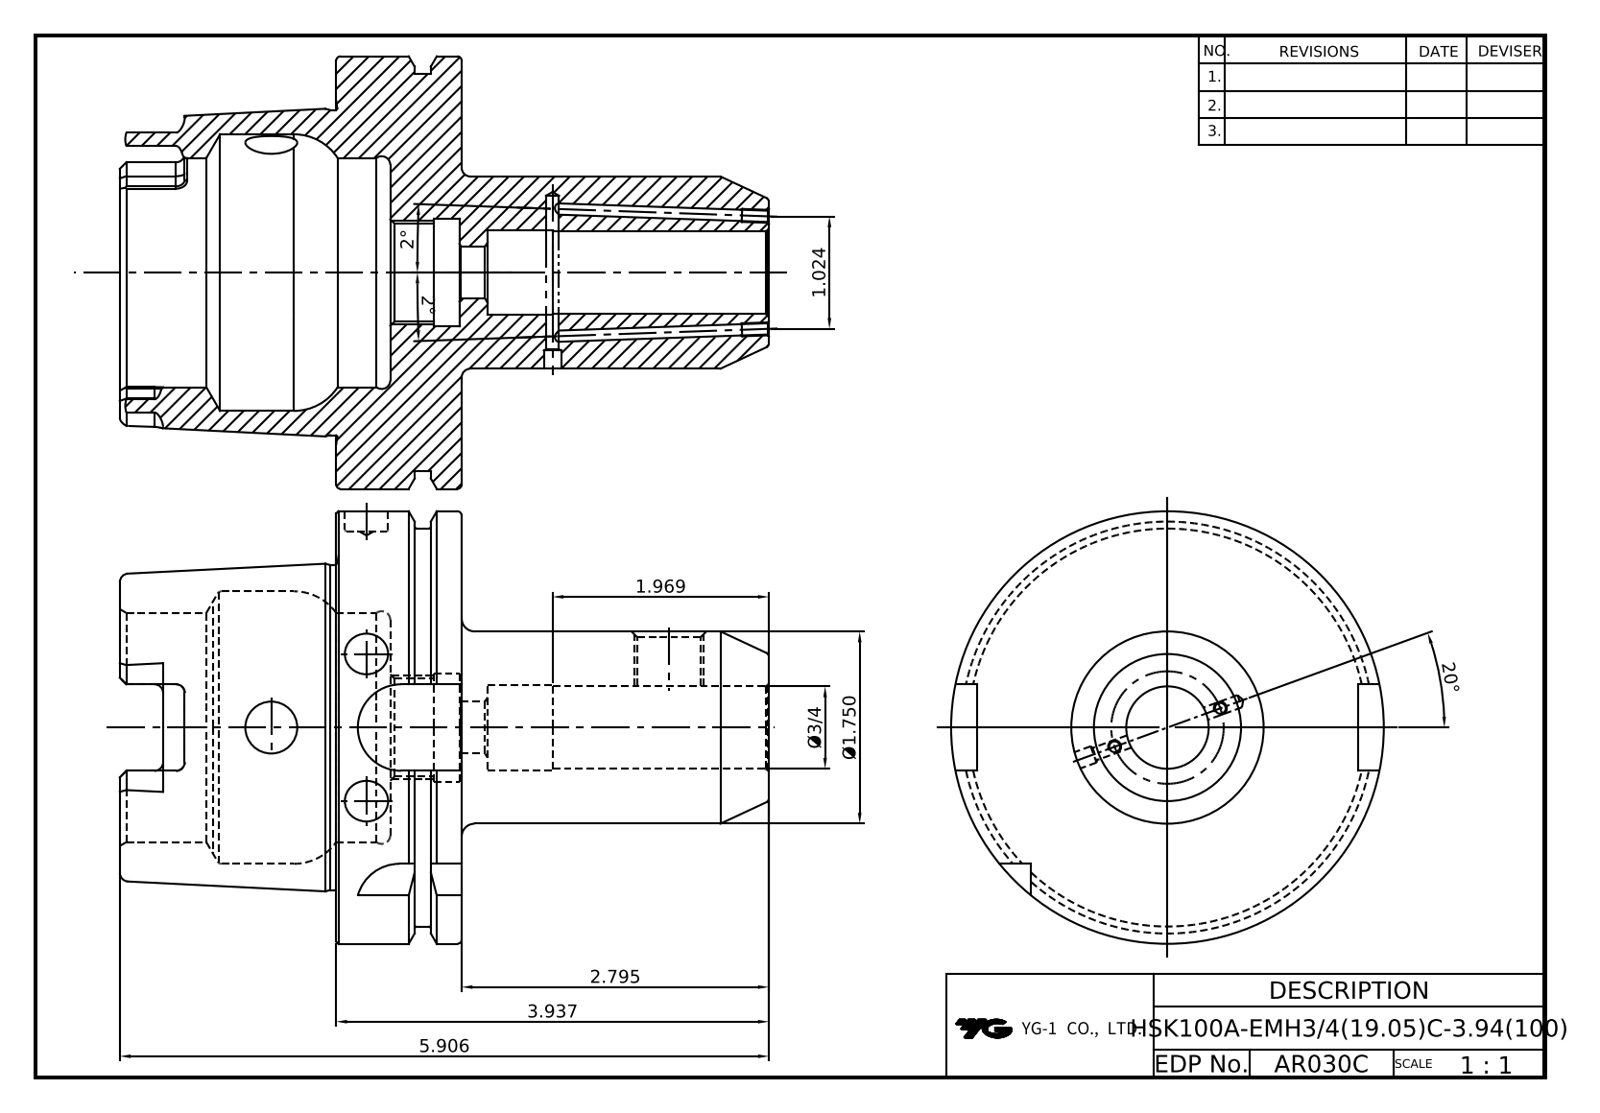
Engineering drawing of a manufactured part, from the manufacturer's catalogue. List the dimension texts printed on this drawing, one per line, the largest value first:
20°
5.906
3.937
2.795
2°
2°
1.969
Ø1.750
1.024
Ø3/4
